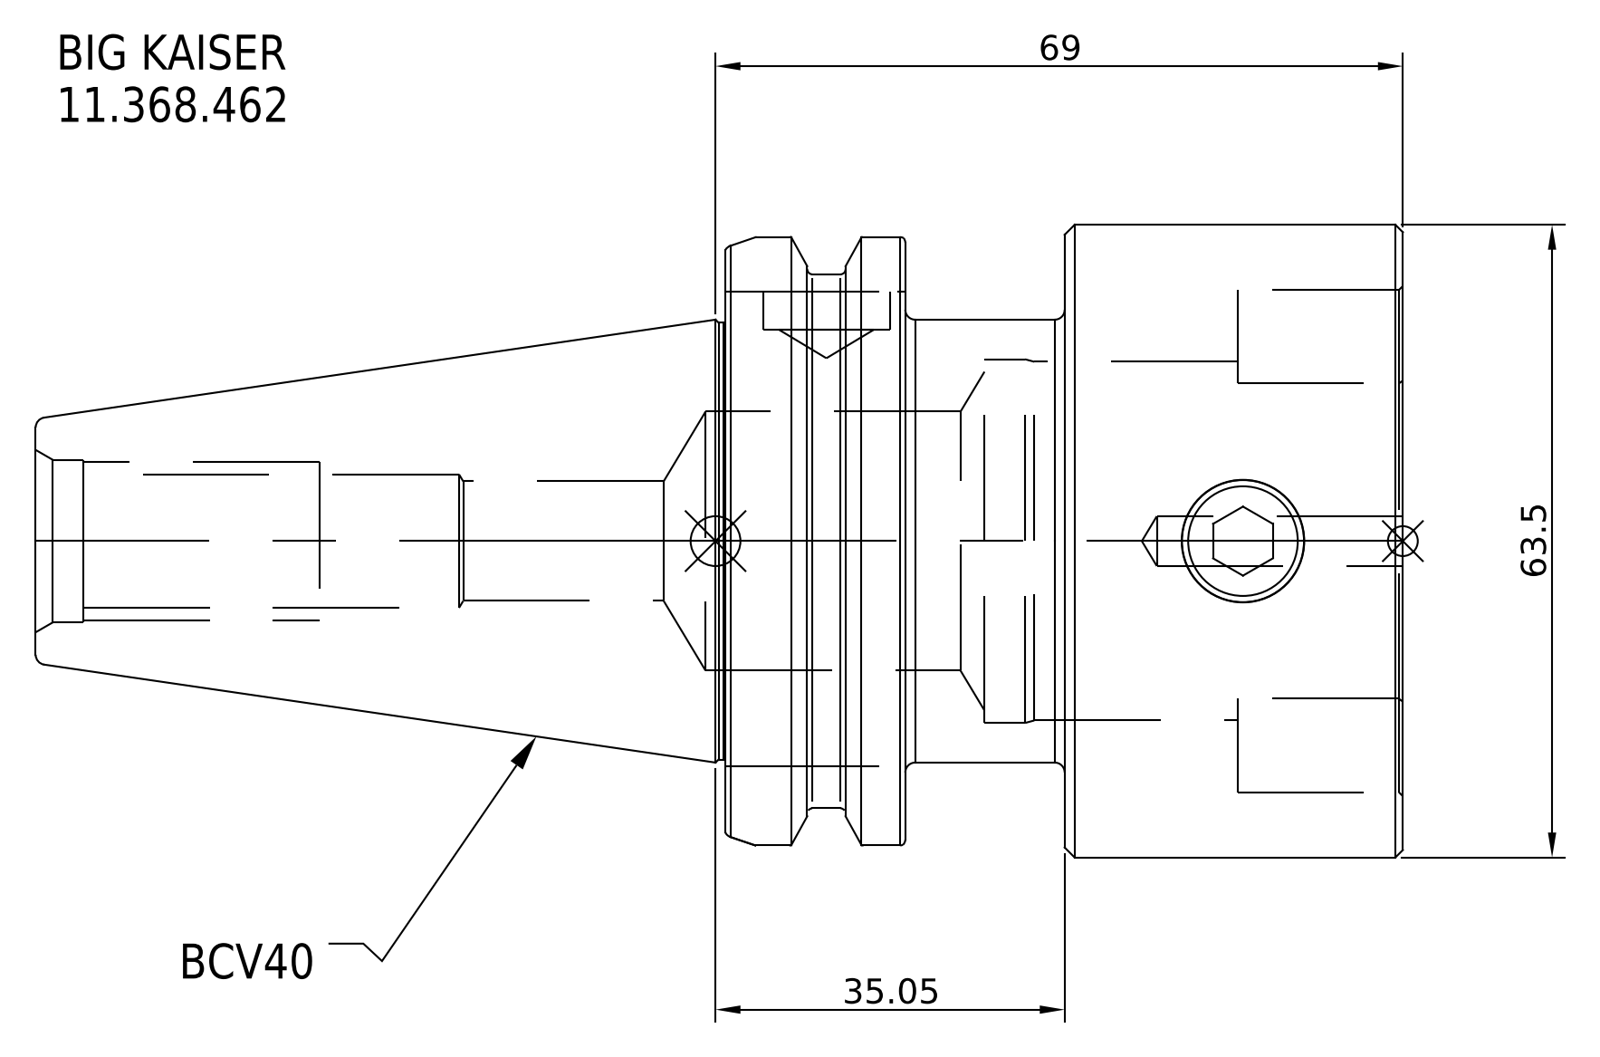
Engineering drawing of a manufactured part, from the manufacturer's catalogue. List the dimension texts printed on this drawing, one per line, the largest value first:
69
63.5
35.05
